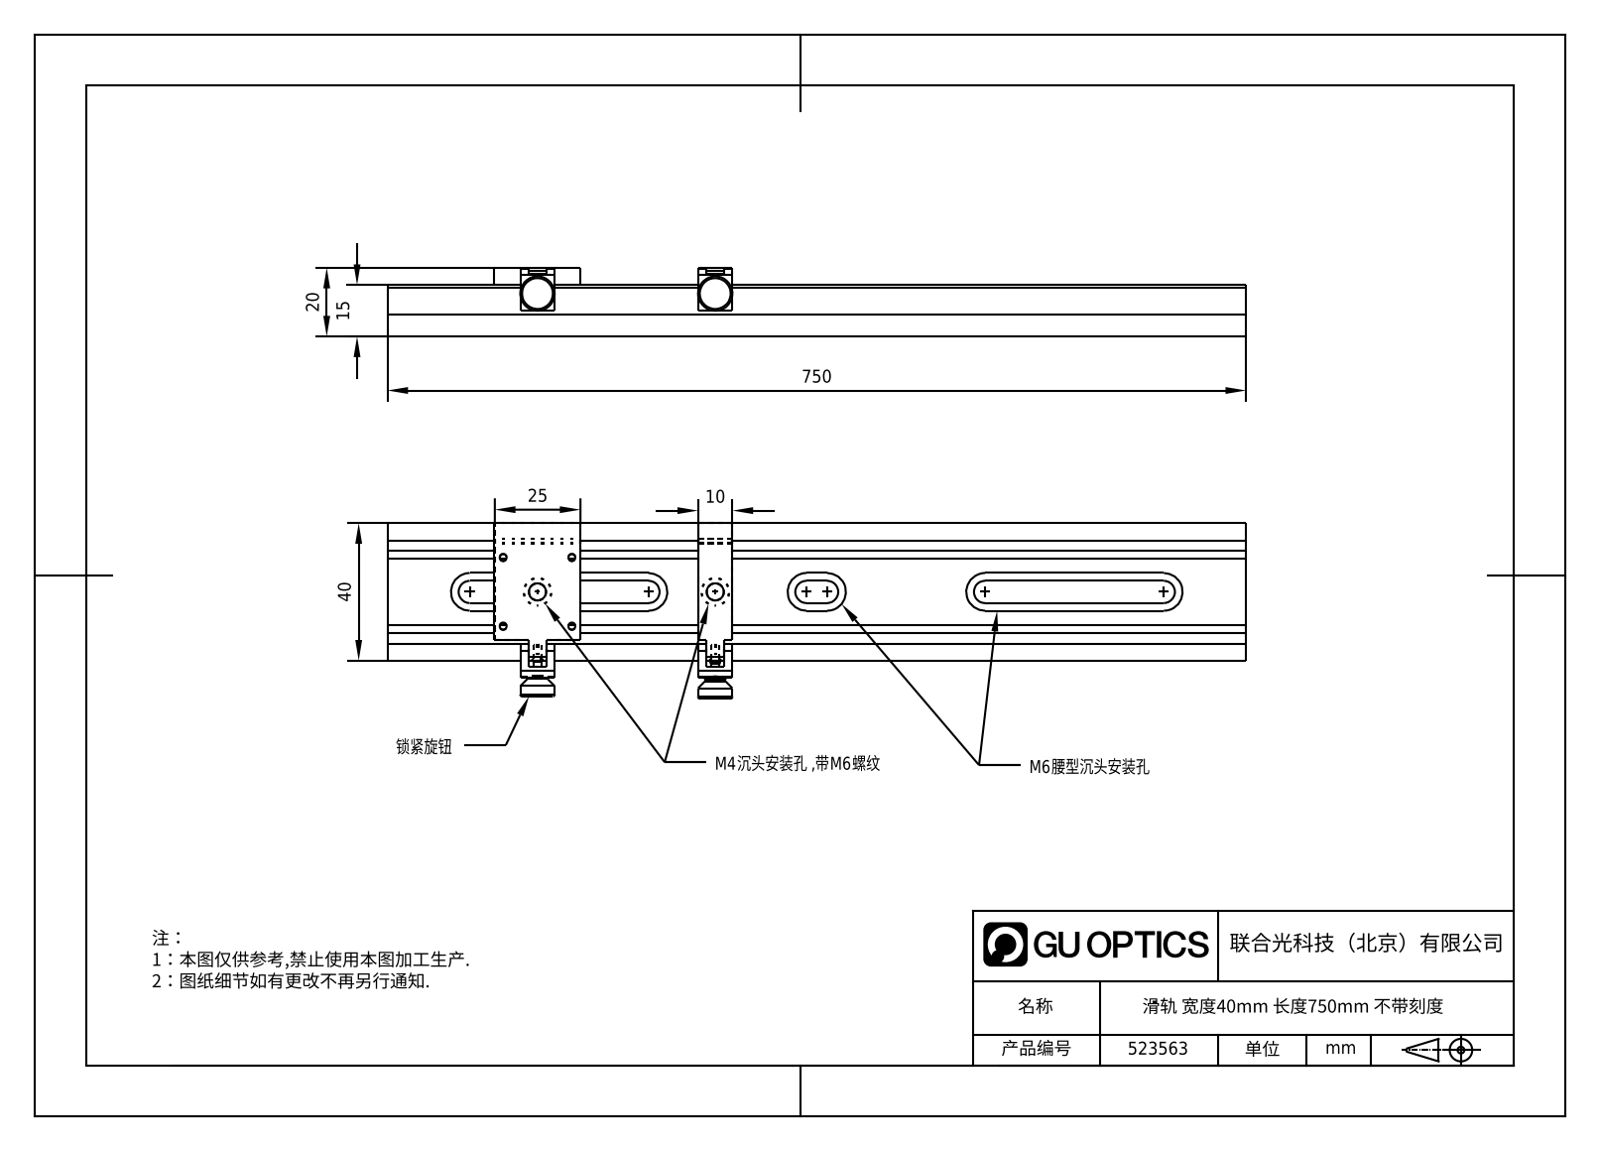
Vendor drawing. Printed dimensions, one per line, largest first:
750
40
25
20
15
10
